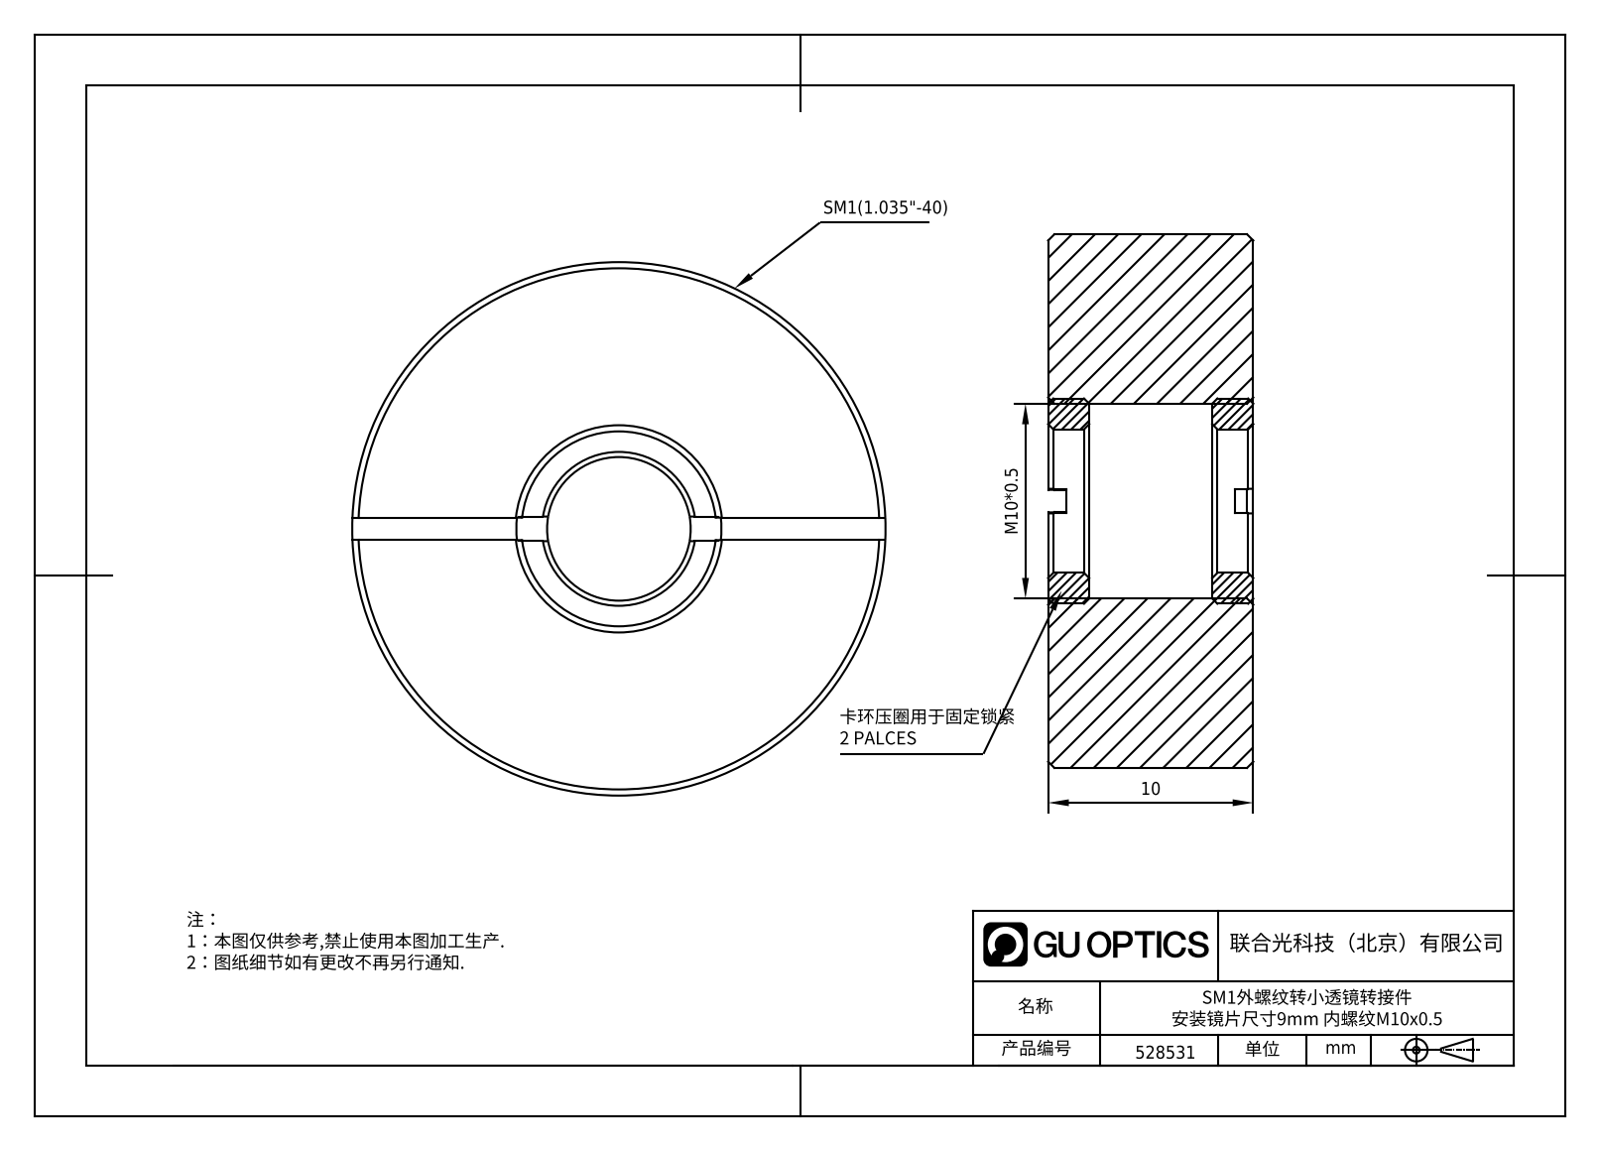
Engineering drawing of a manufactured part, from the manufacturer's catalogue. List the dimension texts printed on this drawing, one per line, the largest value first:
M10*0.5
10
